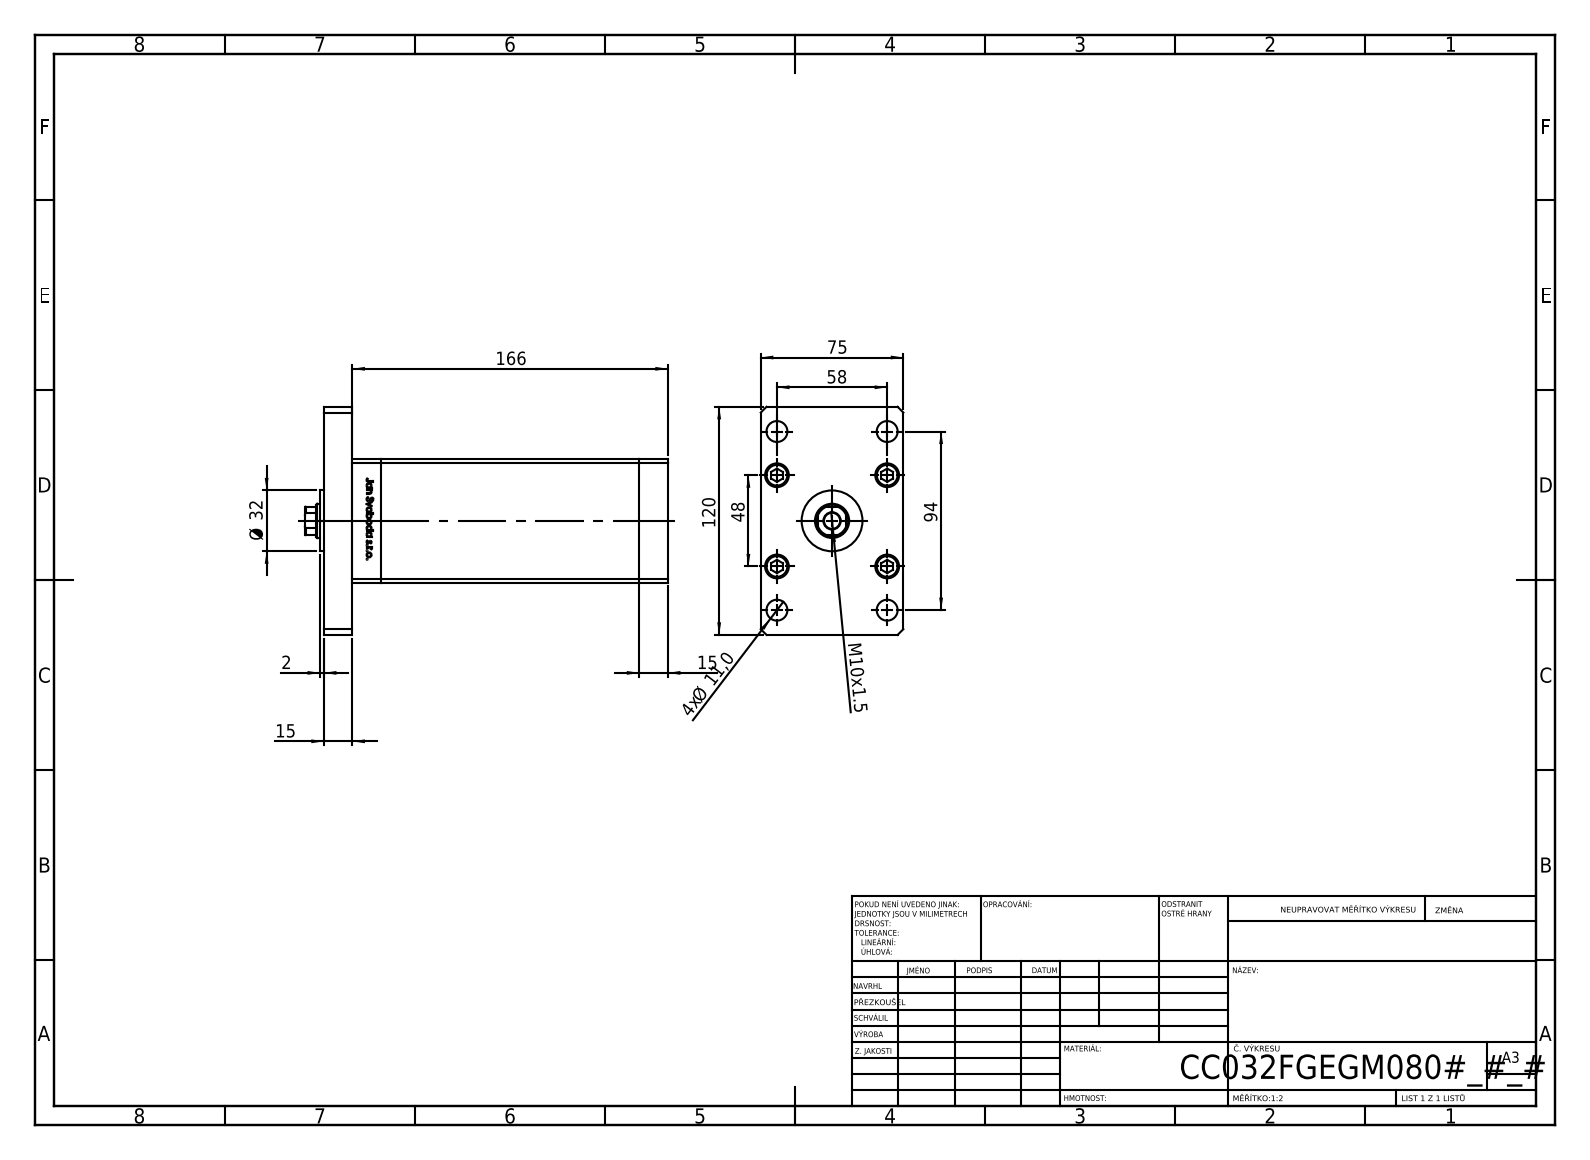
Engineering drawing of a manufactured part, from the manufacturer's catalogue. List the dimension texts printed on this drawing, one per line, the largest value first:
166
120
94
75
58
48
Ø 32
15
15
4x Ø 11,0
M10x1.5
2
